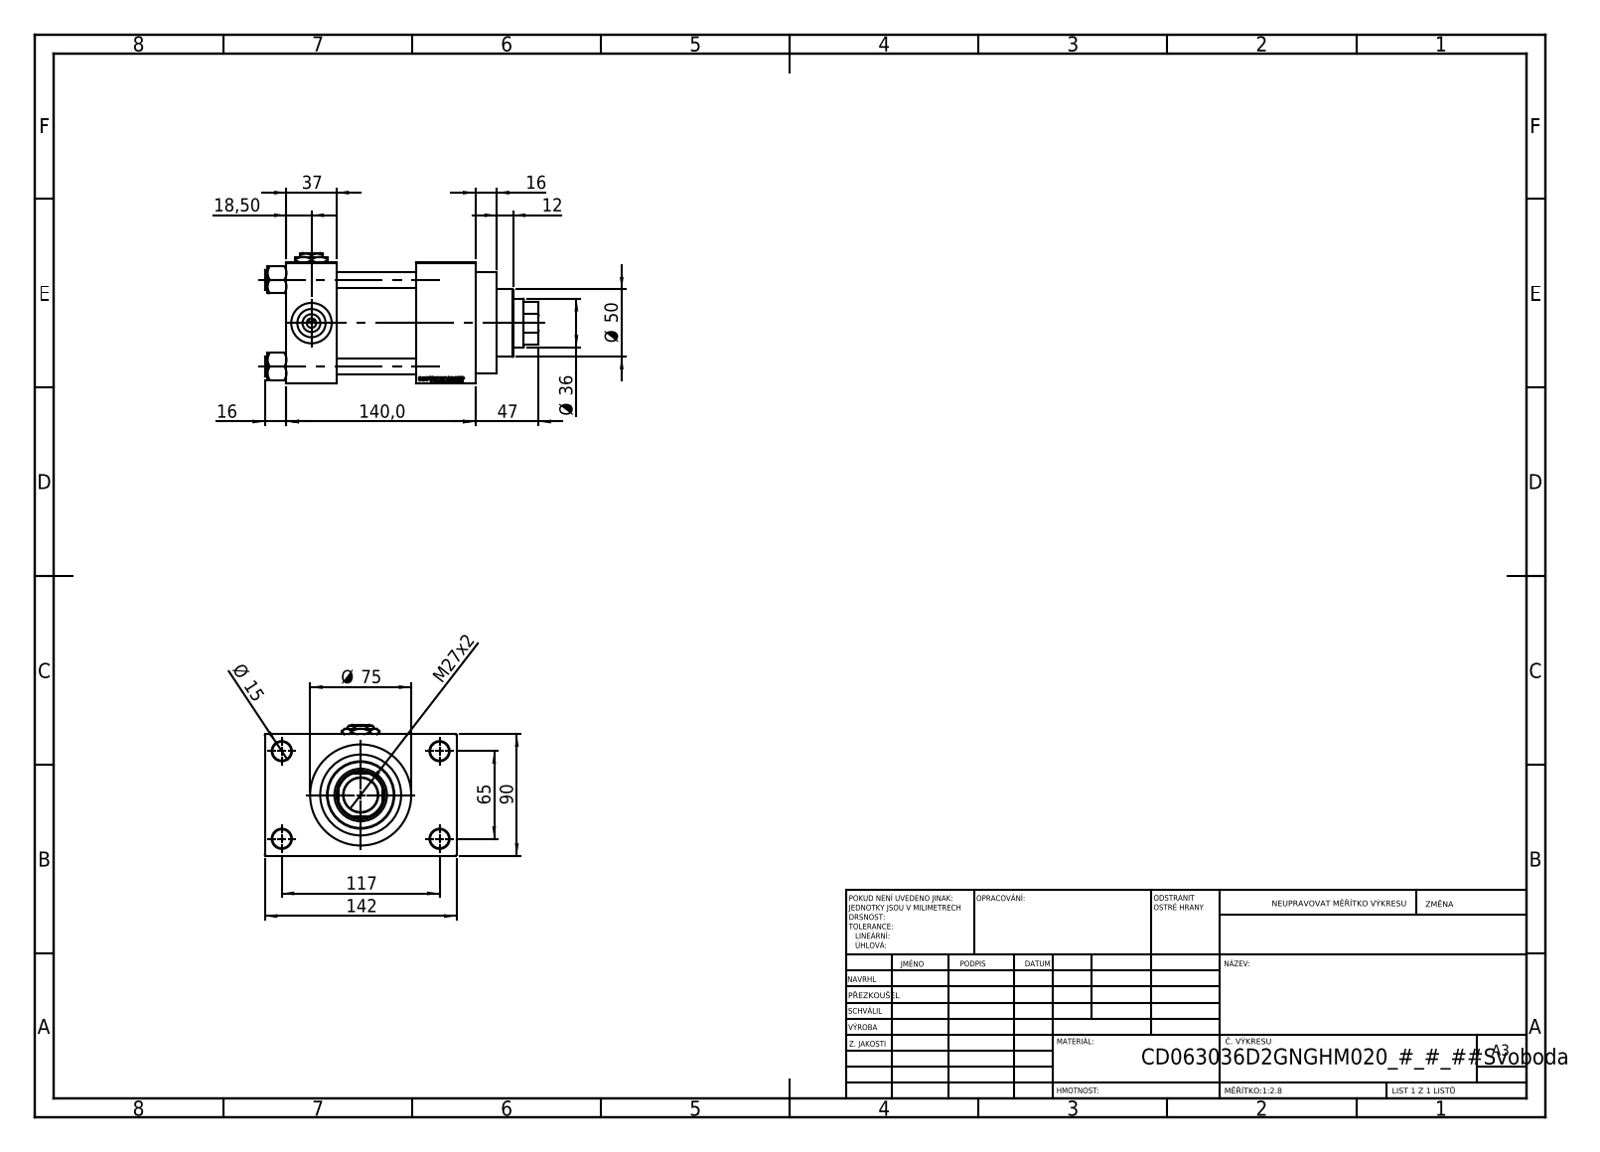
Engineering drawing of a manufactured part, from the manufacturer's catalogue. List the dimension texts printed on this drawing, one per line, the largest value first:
142
140,0
117
90
Ø 75
65
Ø 50
47
37
Ø 36
M27x2
18,50
16
16
Ø 15
12
